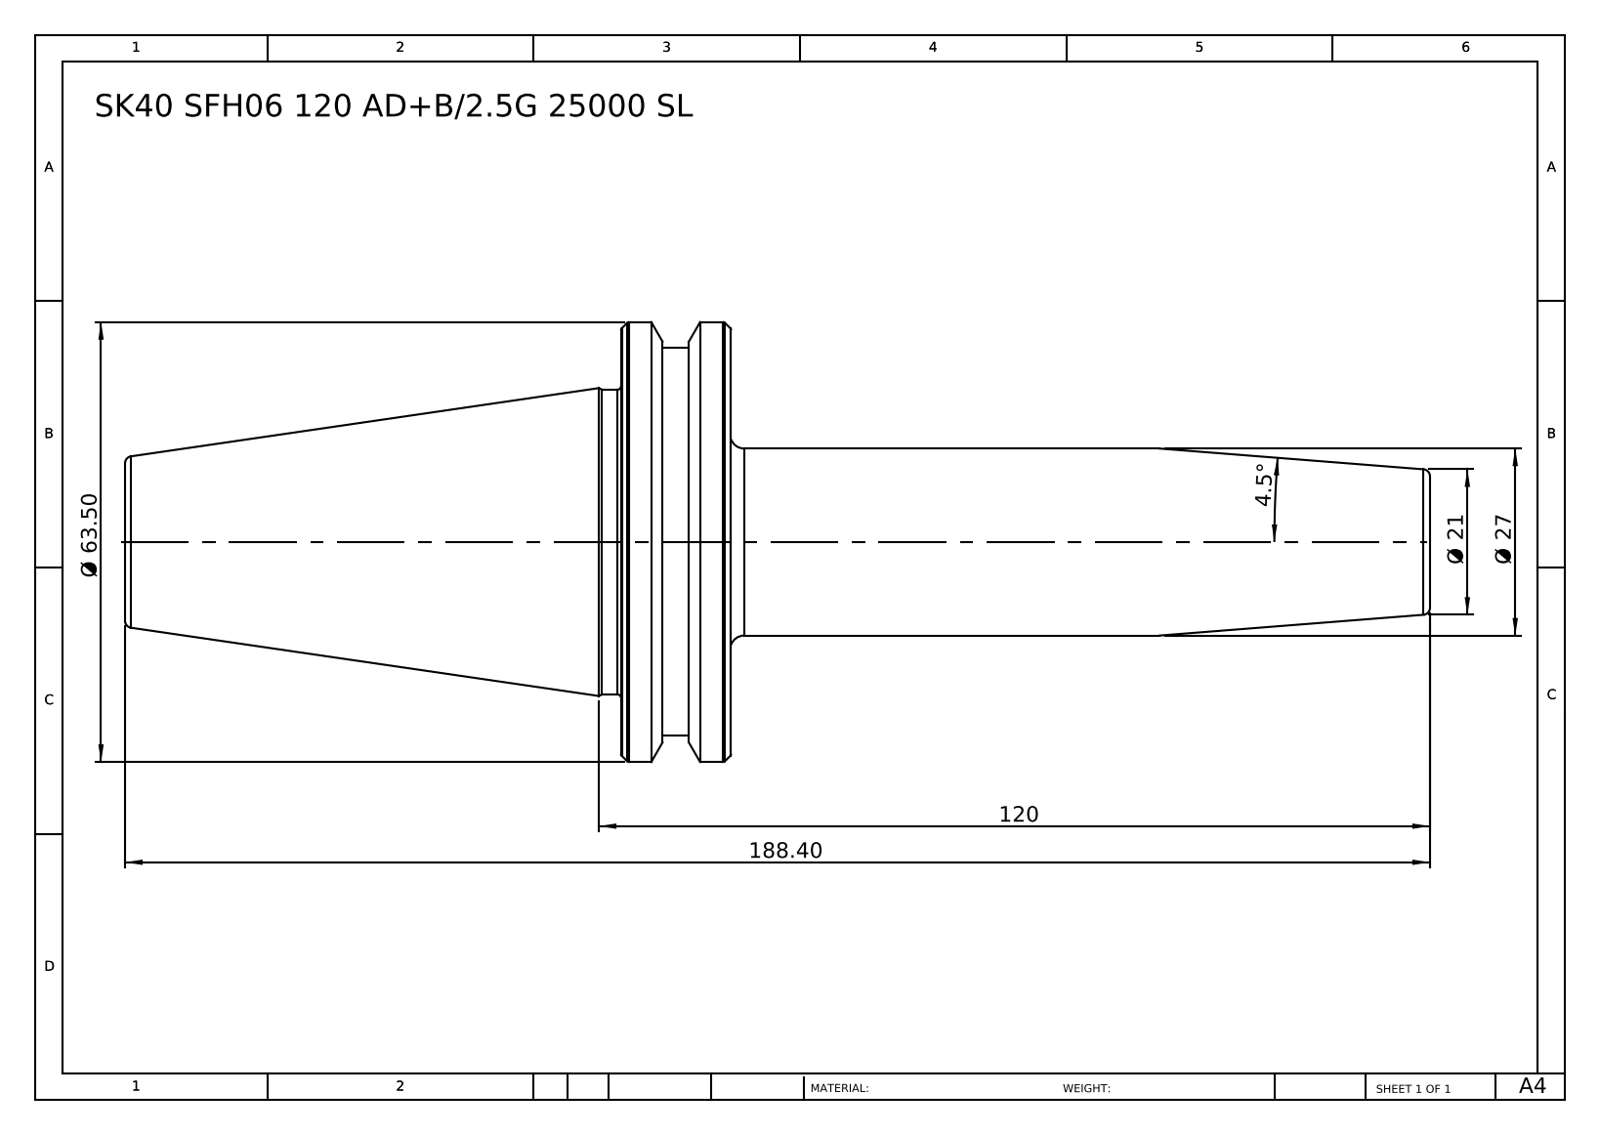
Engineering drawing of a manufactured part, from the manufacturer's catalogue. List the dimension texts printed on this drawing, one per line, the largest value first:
188.40
120
Ø 63.50
Ø 27
Ø 21
4.5°
